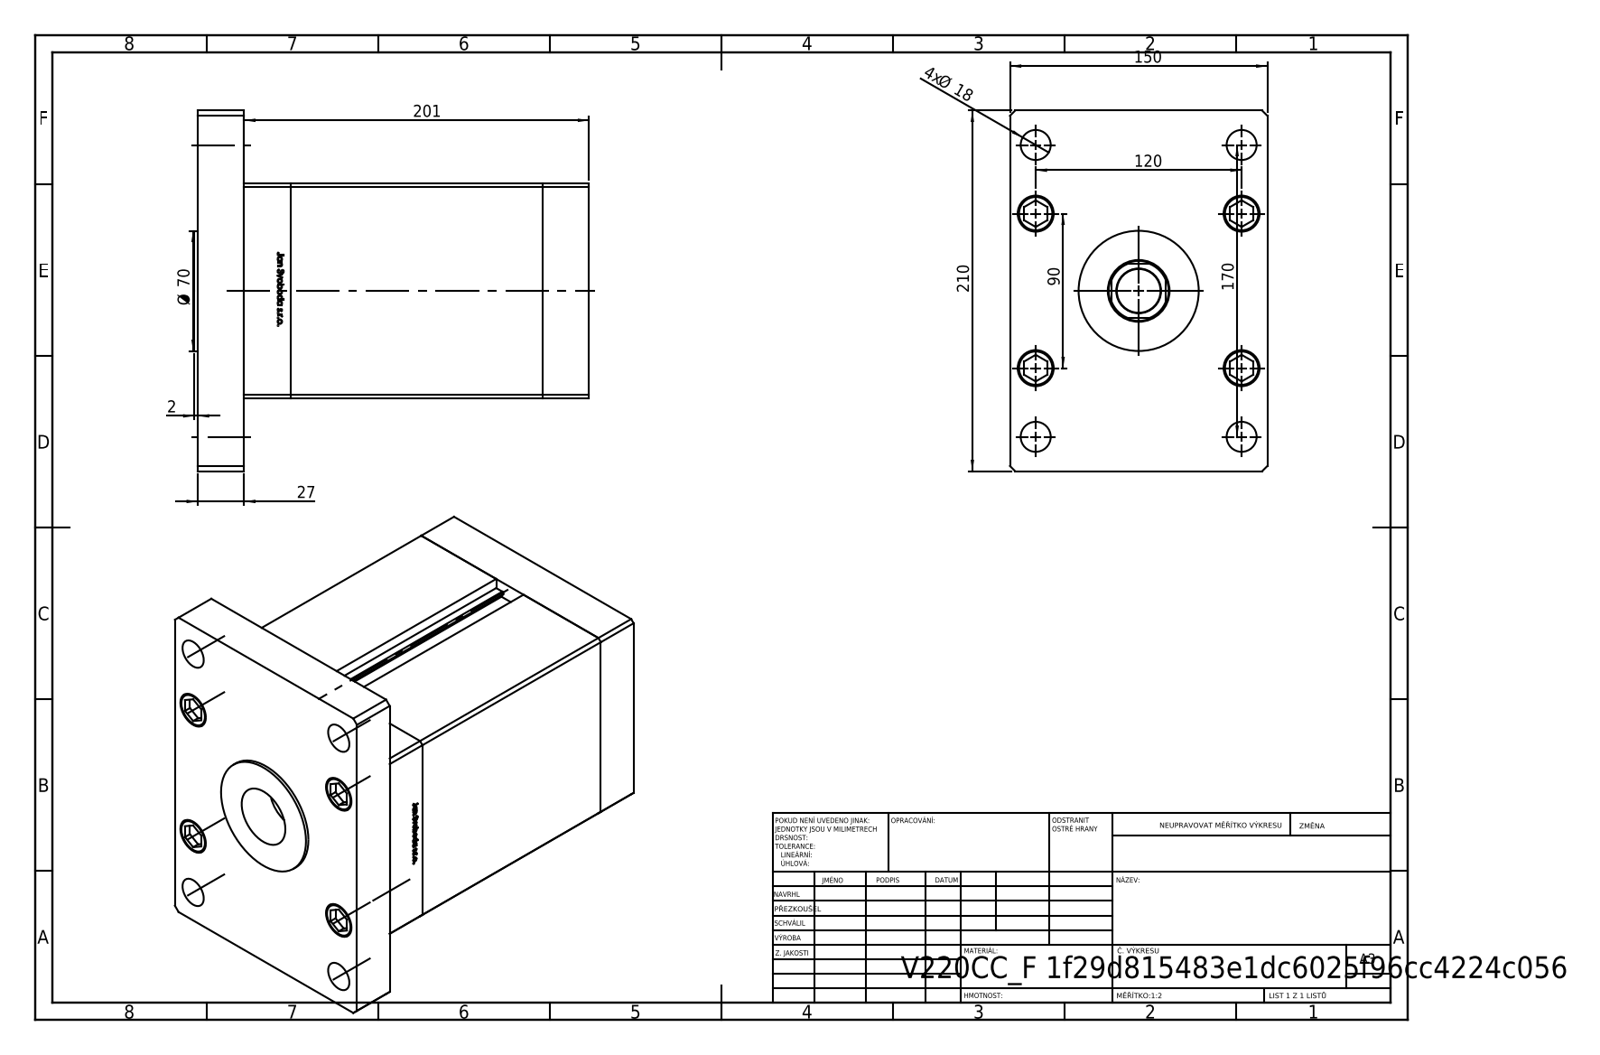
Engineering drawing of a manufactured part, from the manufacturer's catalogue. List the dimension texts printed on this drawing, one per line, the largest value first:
210
201
170
150
120
90
Ø 70
27
4x Ø 18
2
